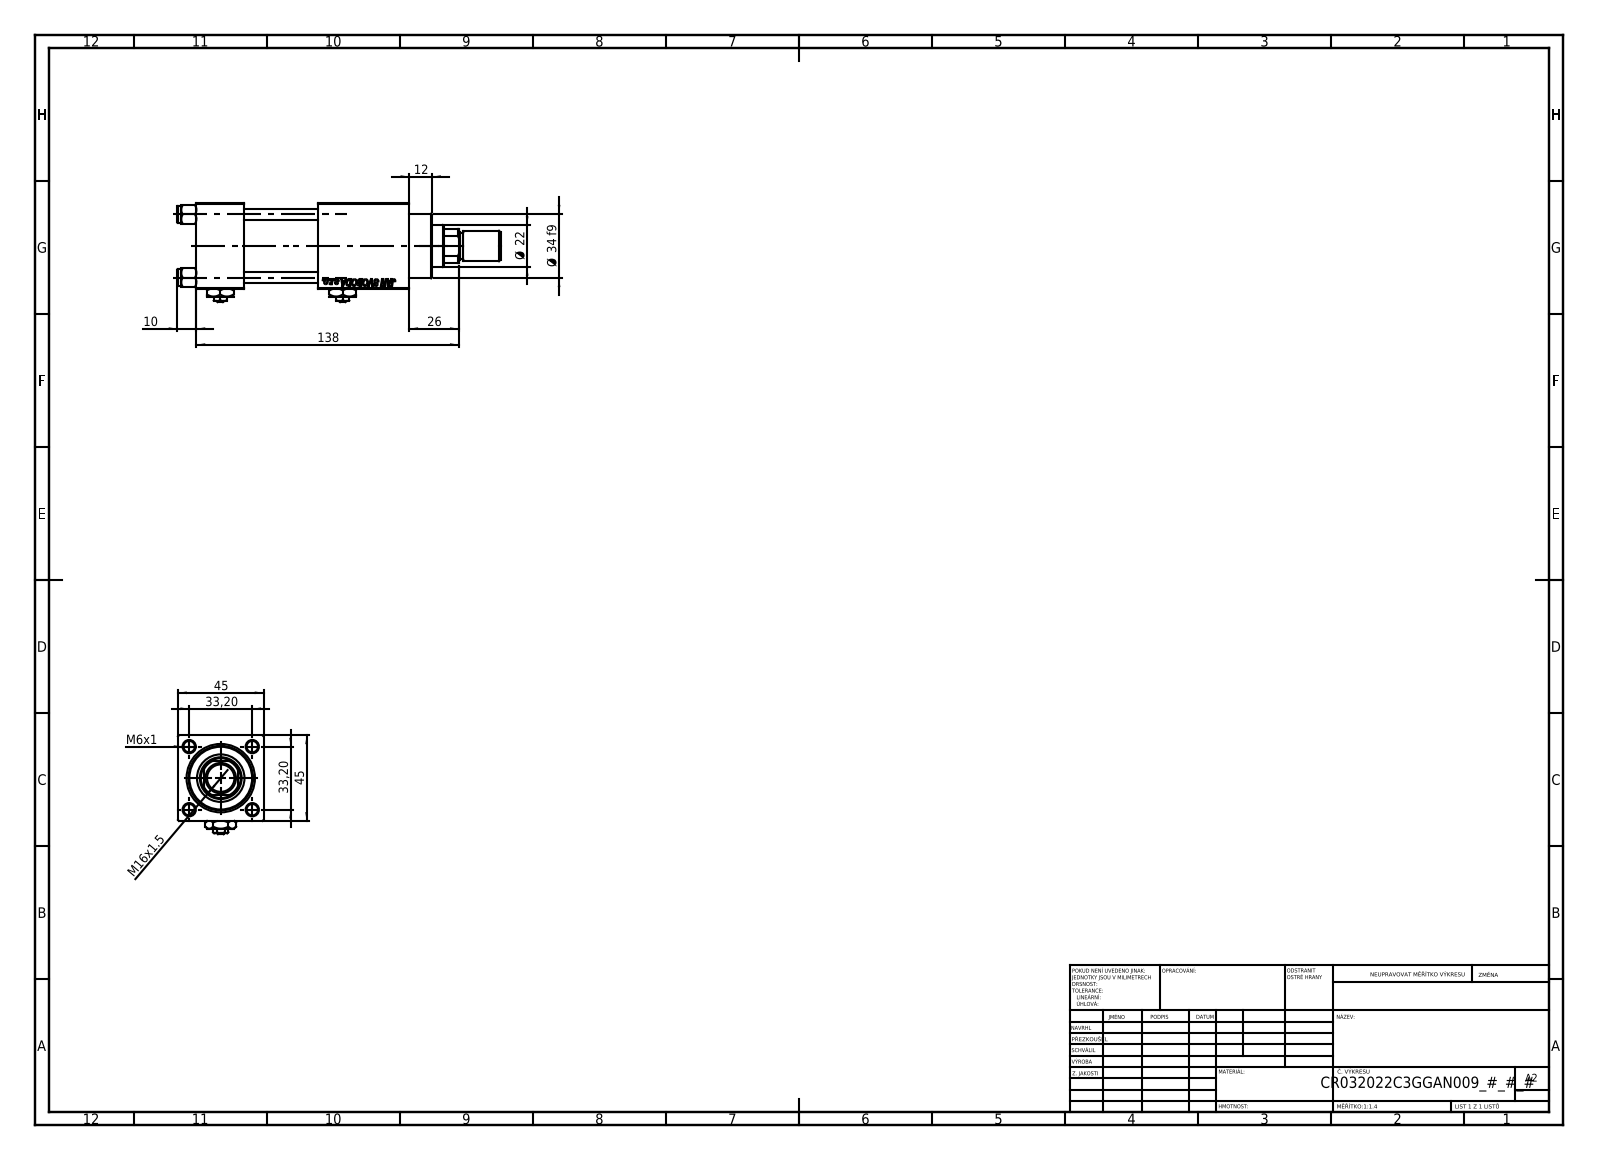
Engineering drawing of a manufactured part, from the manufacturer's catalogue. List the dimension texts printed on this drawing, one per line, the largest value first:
138
45
45
Ø 34 f9
33,20
33,20
26
Ø 22
M16x1.5
12
10
M6x1
